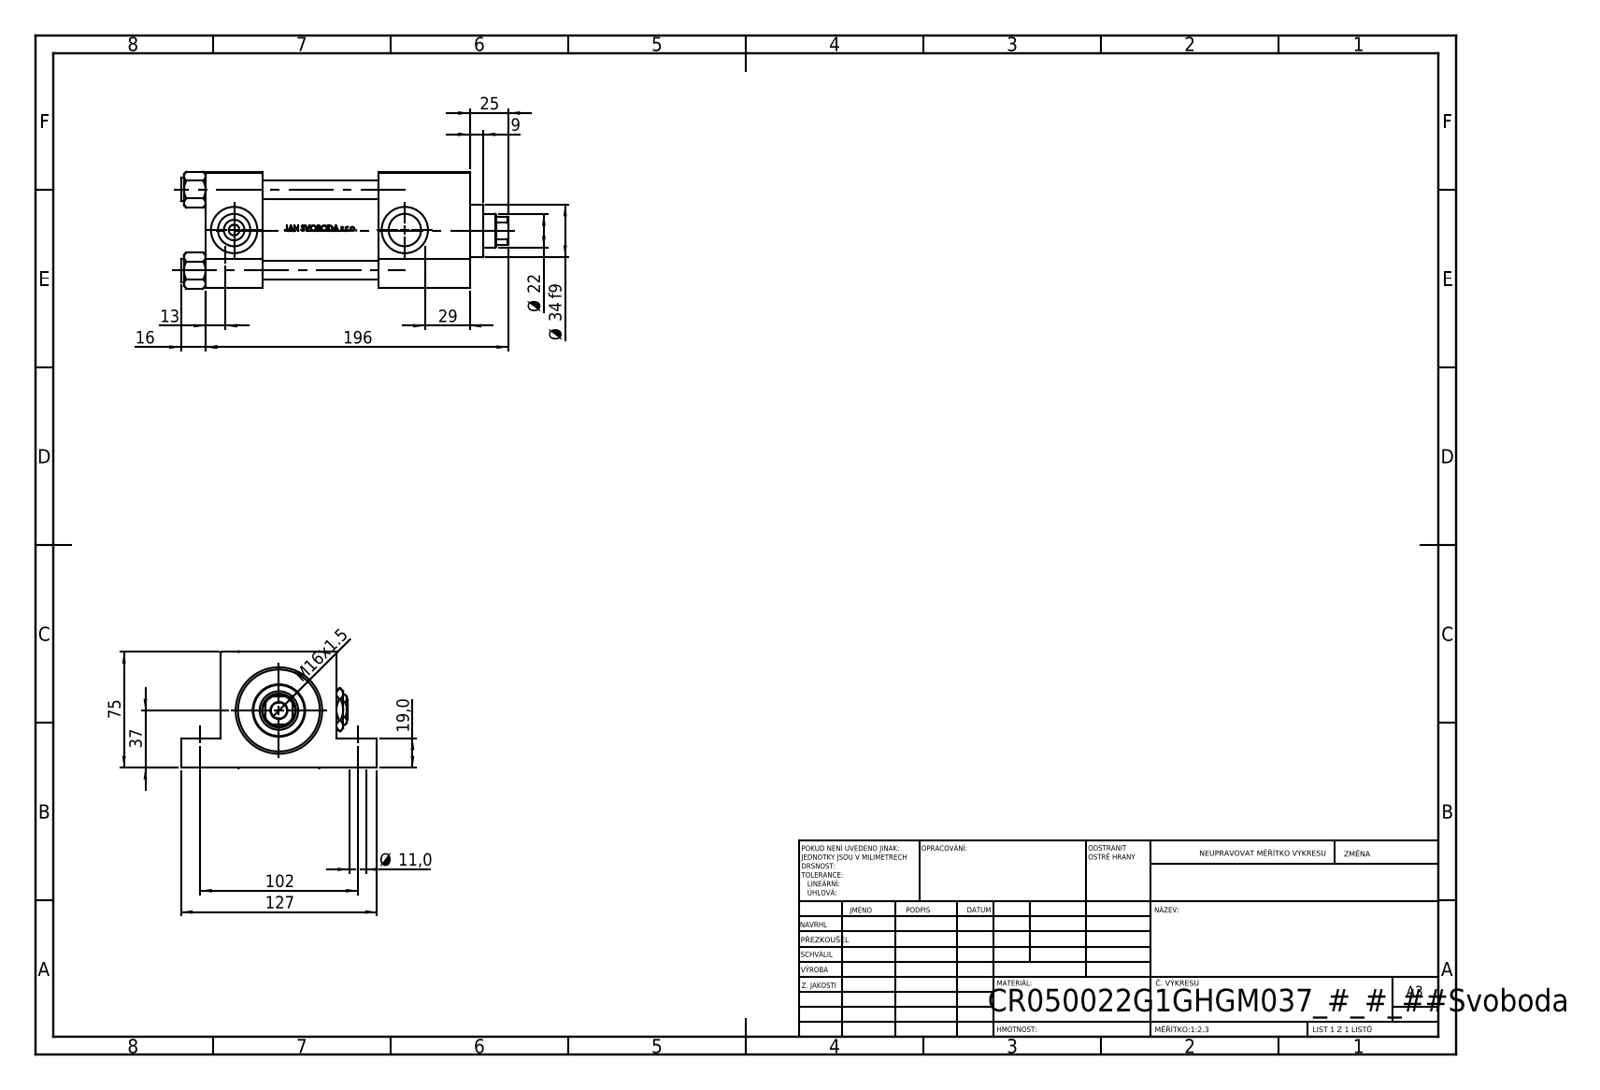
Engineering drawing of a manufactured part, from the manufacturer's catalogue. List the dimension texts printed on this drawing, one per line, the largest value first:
196
127
102
75
37
Ø 34 f9
29
25
Ø 22
19,0
16
M16x1.5
13
Ø 11,0
9
